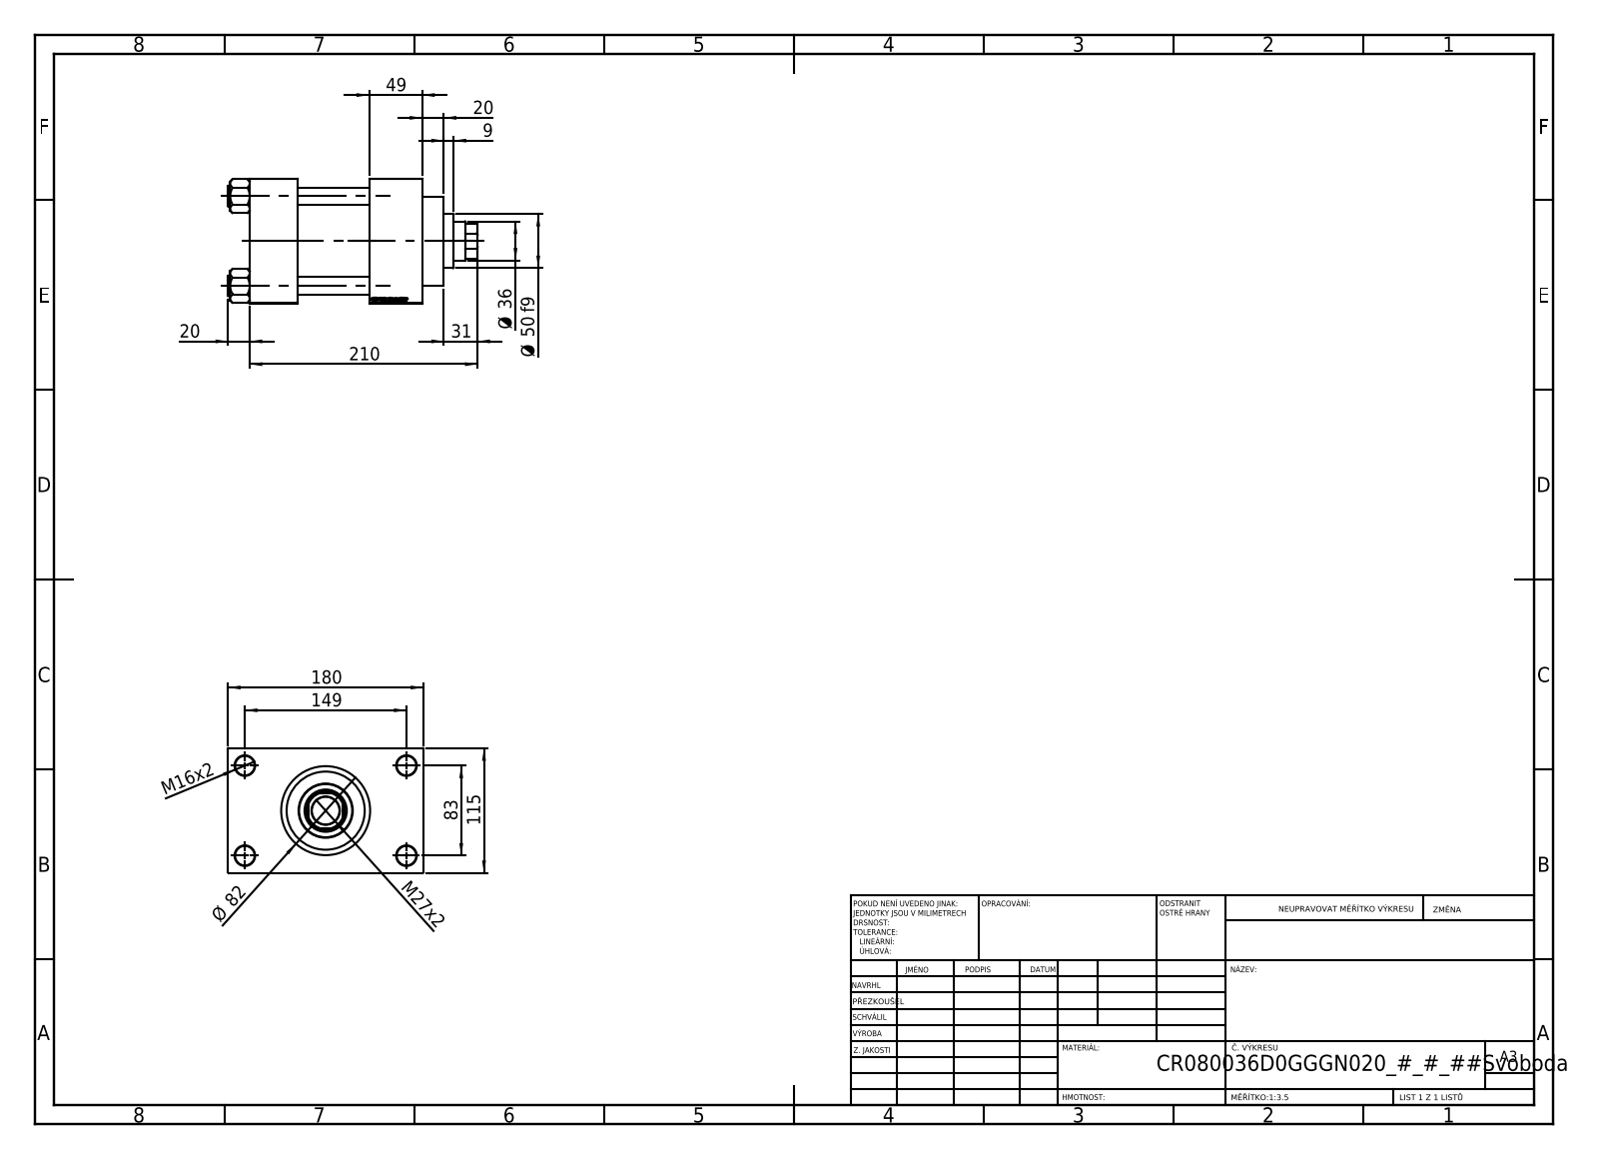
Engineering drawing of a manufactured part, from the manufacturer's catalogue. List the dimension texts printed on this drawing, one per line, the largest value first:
210
180
149
115
83
Ø 82
Ø 50 f9
49
Ø 36
31
M27x2
20
20
M16x2
9
